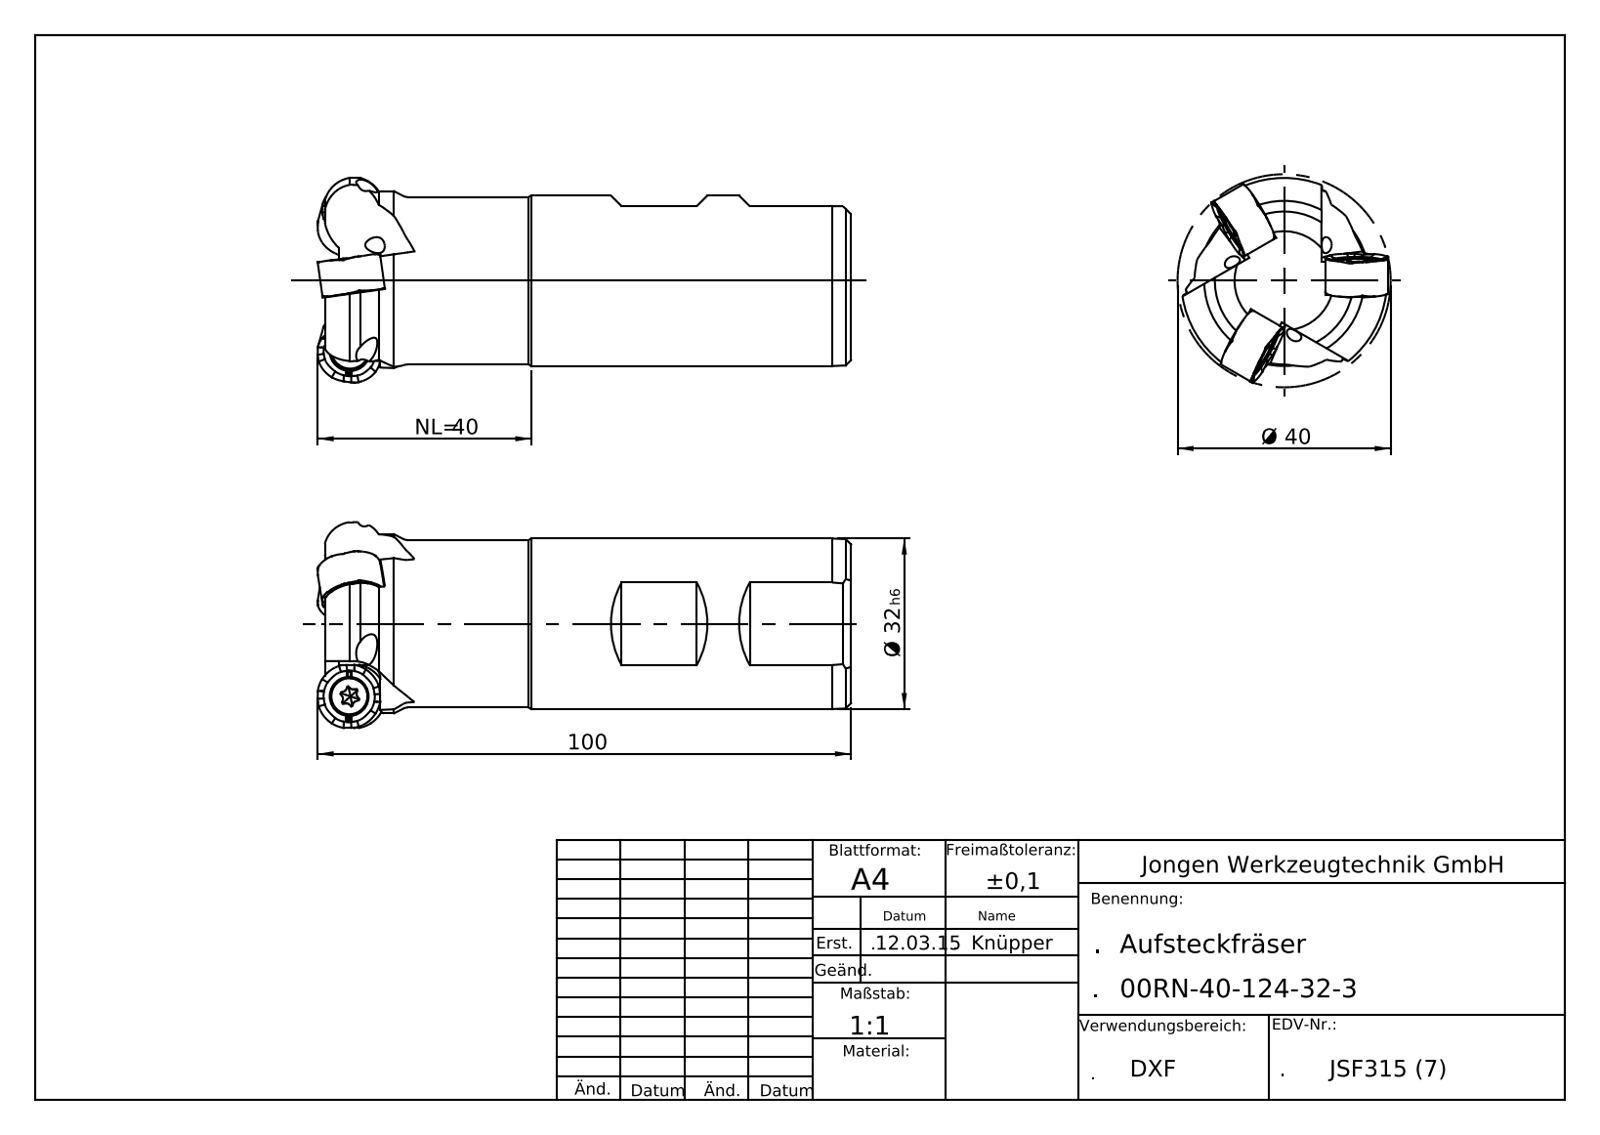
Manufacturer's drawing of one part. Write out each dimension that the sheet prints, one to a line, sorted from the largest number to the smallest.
100
NL= 40
Ø 40
Ø 32 h6
